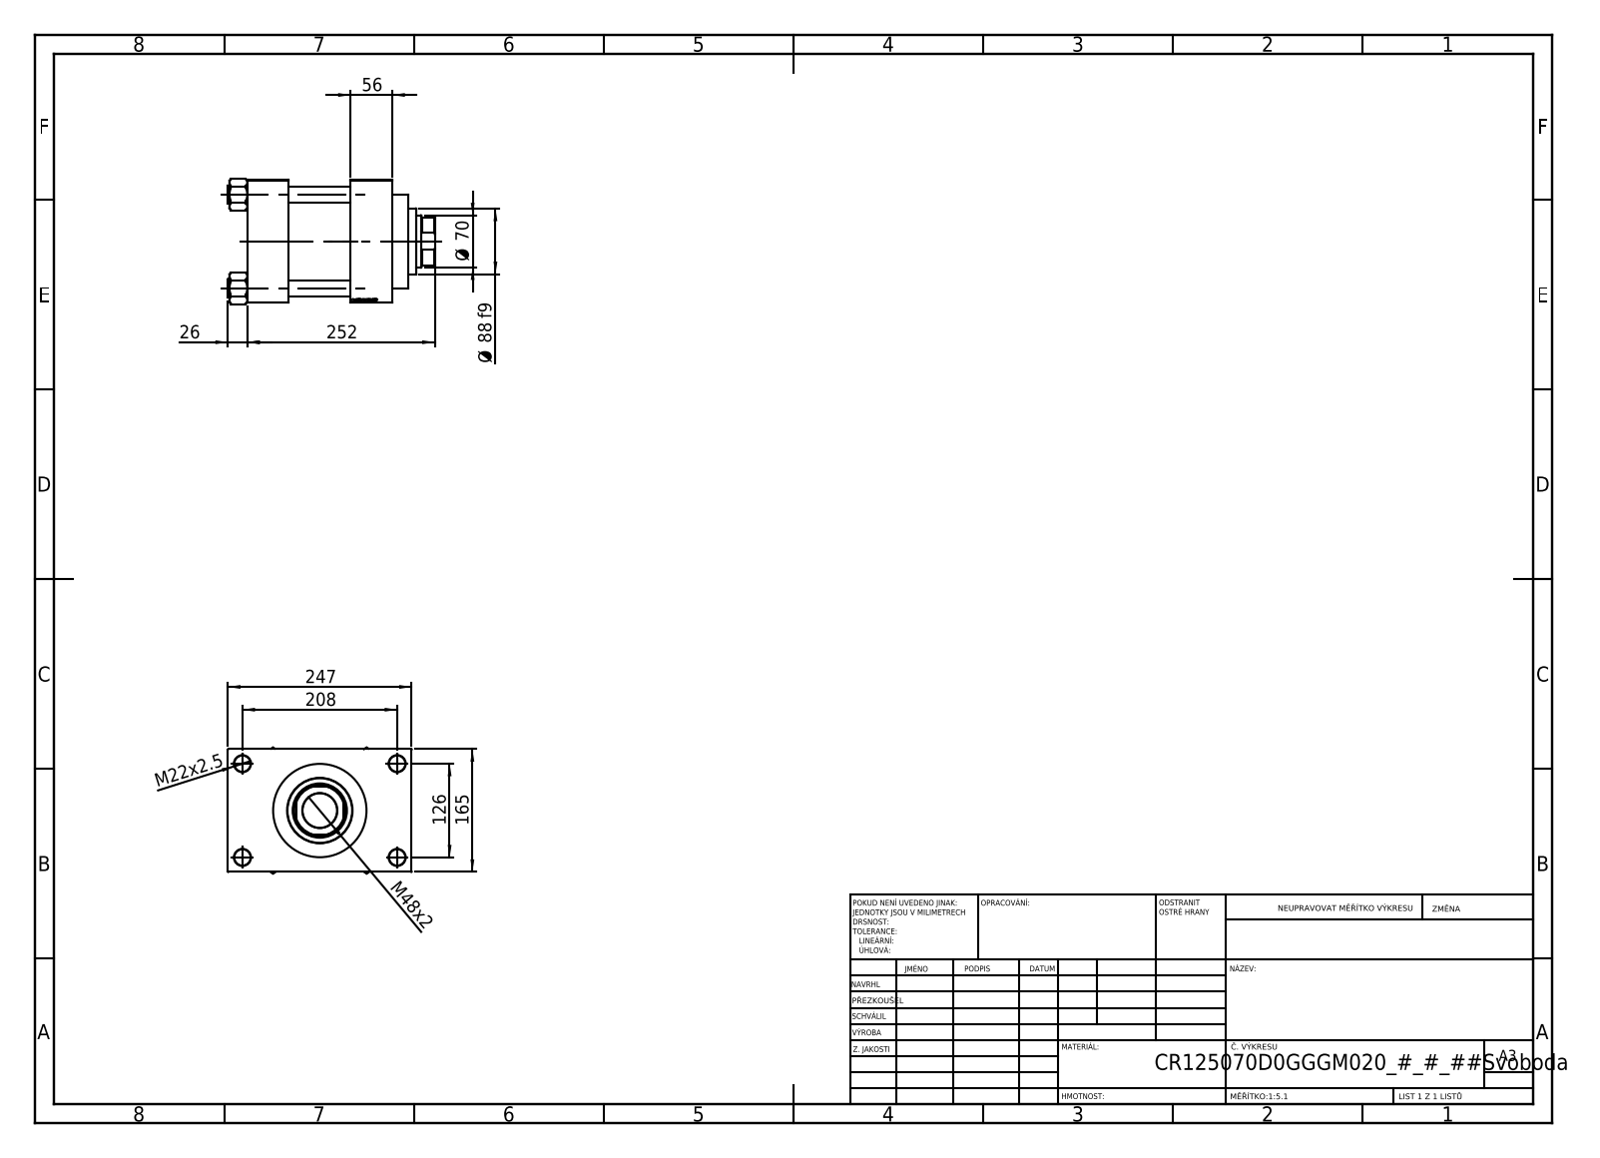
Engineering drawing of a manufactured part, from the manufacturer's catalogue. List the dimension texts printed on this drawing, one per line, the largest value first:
252
247
208
165
126
Ø 88 f9
Ø 70
56
M48x2
26
M22x2.5
